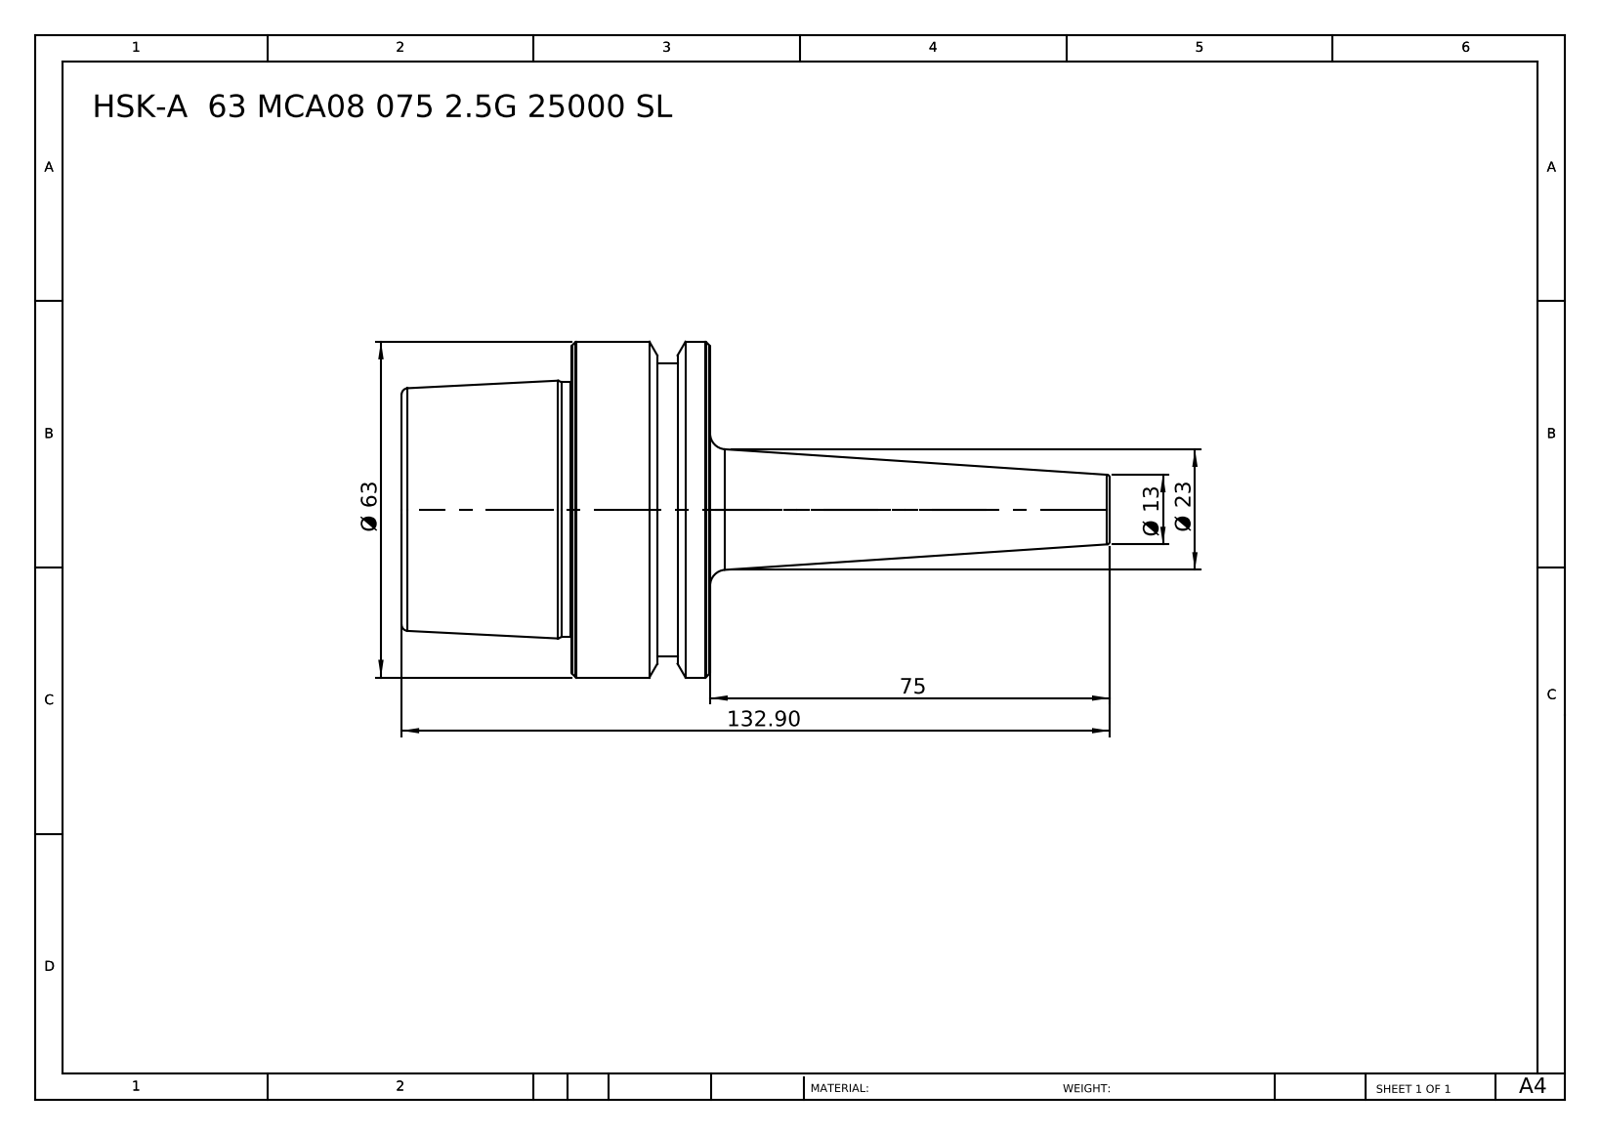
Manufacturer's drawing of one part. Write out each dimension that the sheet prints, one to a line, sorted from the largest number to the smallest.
132.90
75
Ø 63
Ø 23
Ø 13
